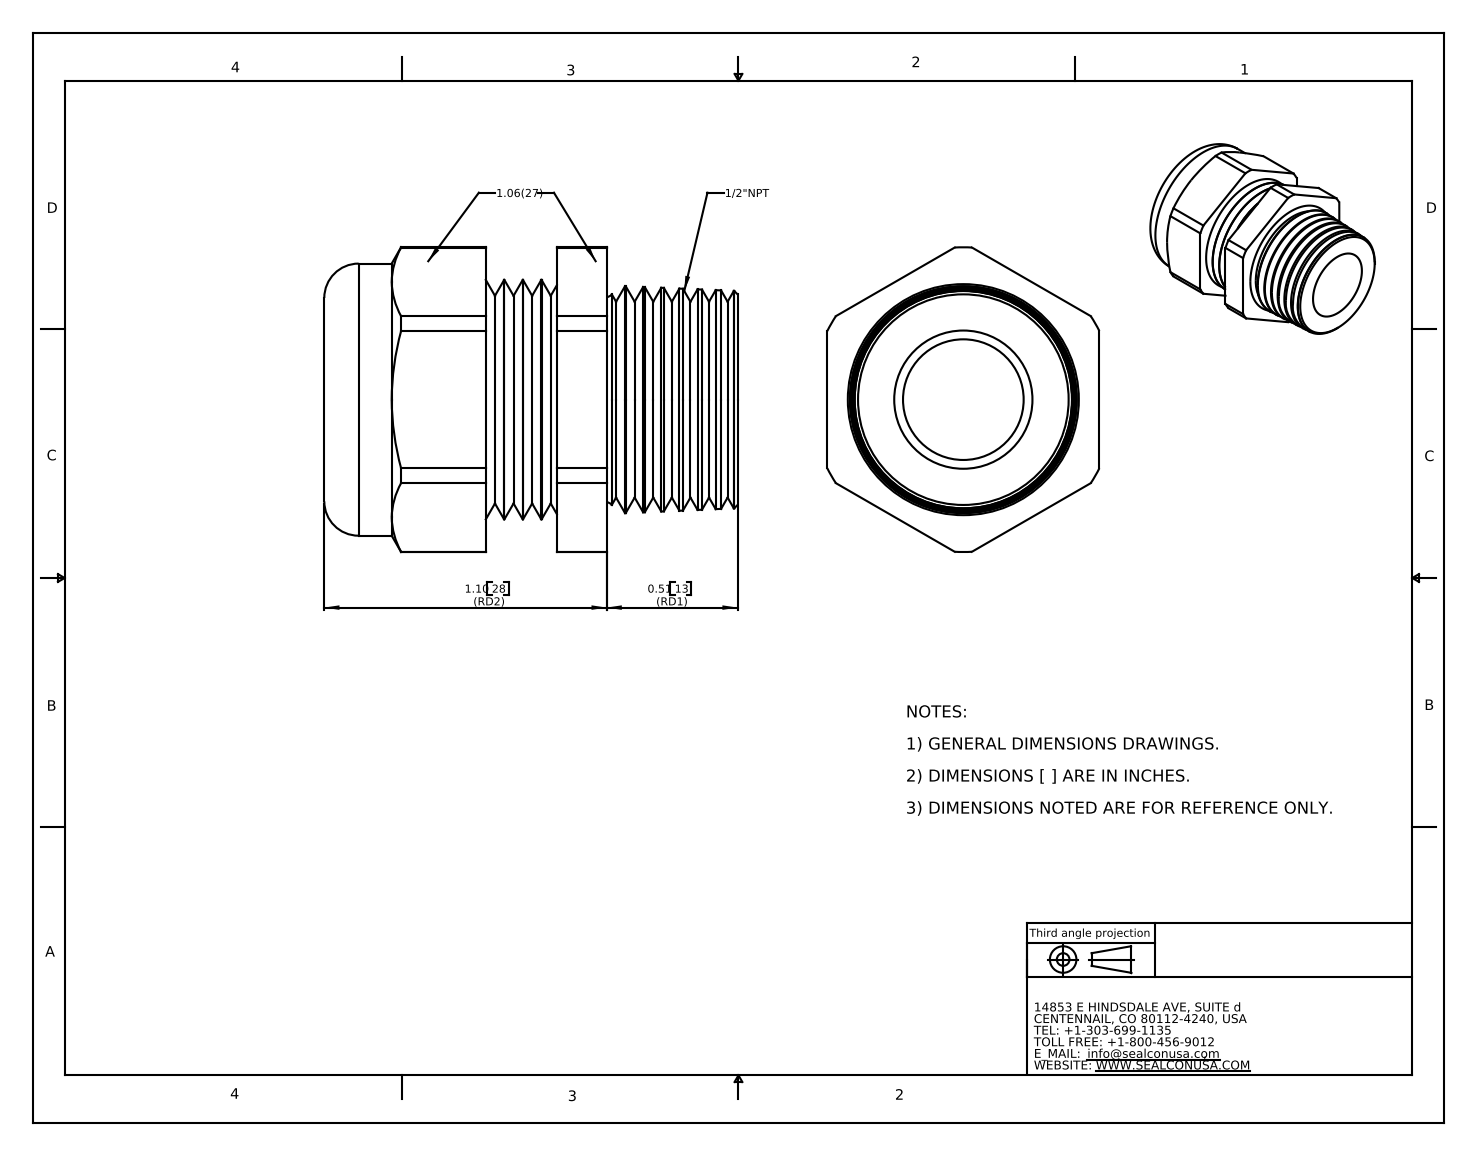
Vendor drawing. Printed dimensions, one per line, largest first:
1.10 28 (RD2)
0.51 13 (RD1)
